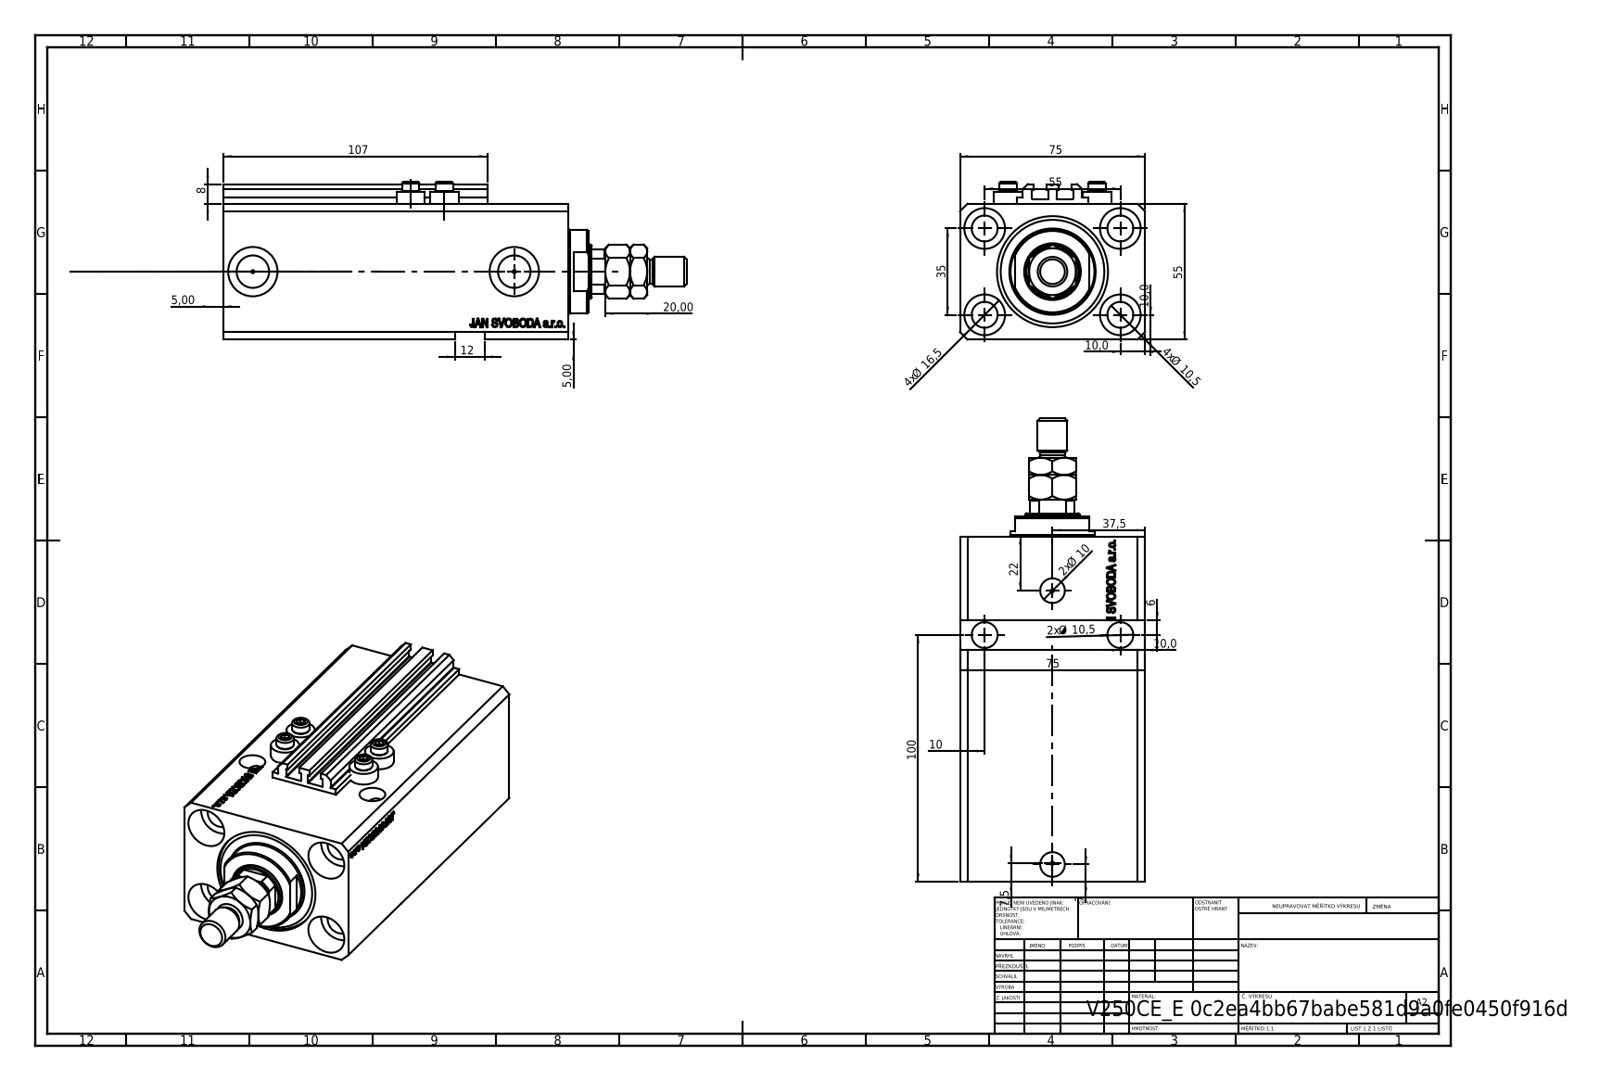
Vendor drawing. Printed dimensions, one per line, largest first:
107
100
75
75
55
55
37,5
35
22
20,00
4x Ø 16,5
12
4x Ø 10,5
2x Ø 10,5
10,0
10,0
2x Ø 10
10,0
10
8
7,5
7
6
5,00
5,00
